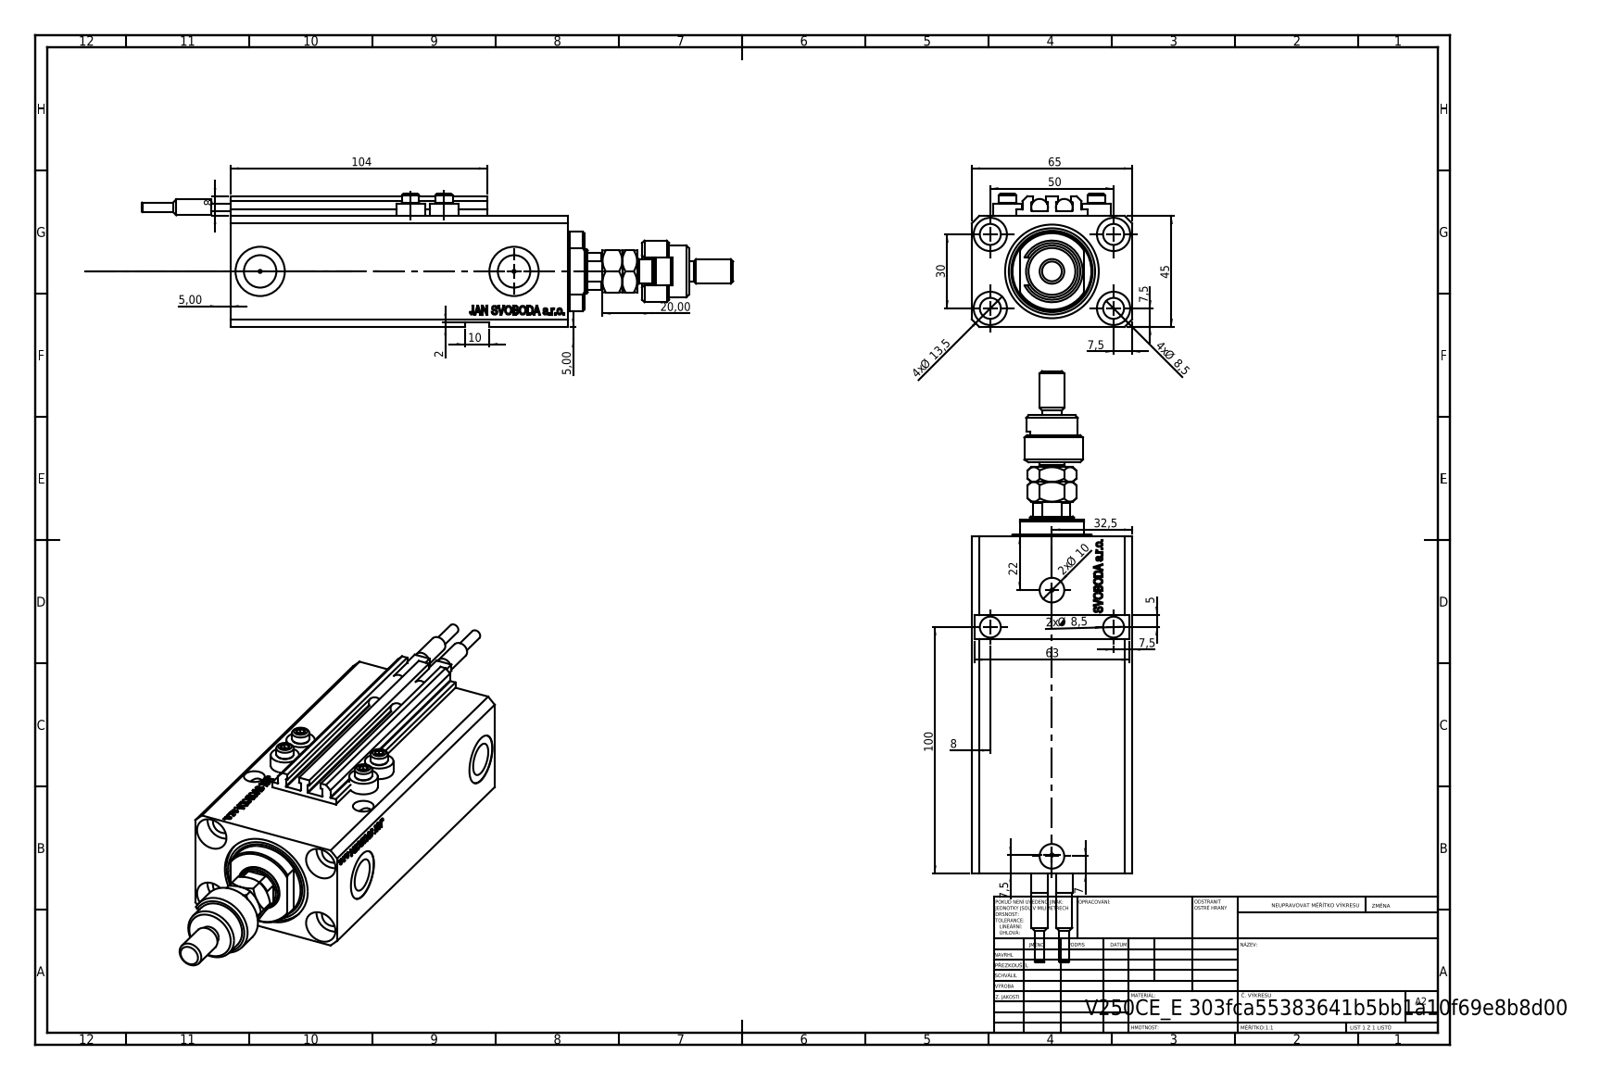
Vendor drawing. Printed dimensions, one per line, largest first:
104
100
65
63
50
45
32,5
30
22
20,00
4x Ø 13,5
10
2x Ø 10
4x Ø 8,5
2x Ø 8,5
8
8
7,5
7,5
7,5
7,5
7
5,00
5,00
5
2
